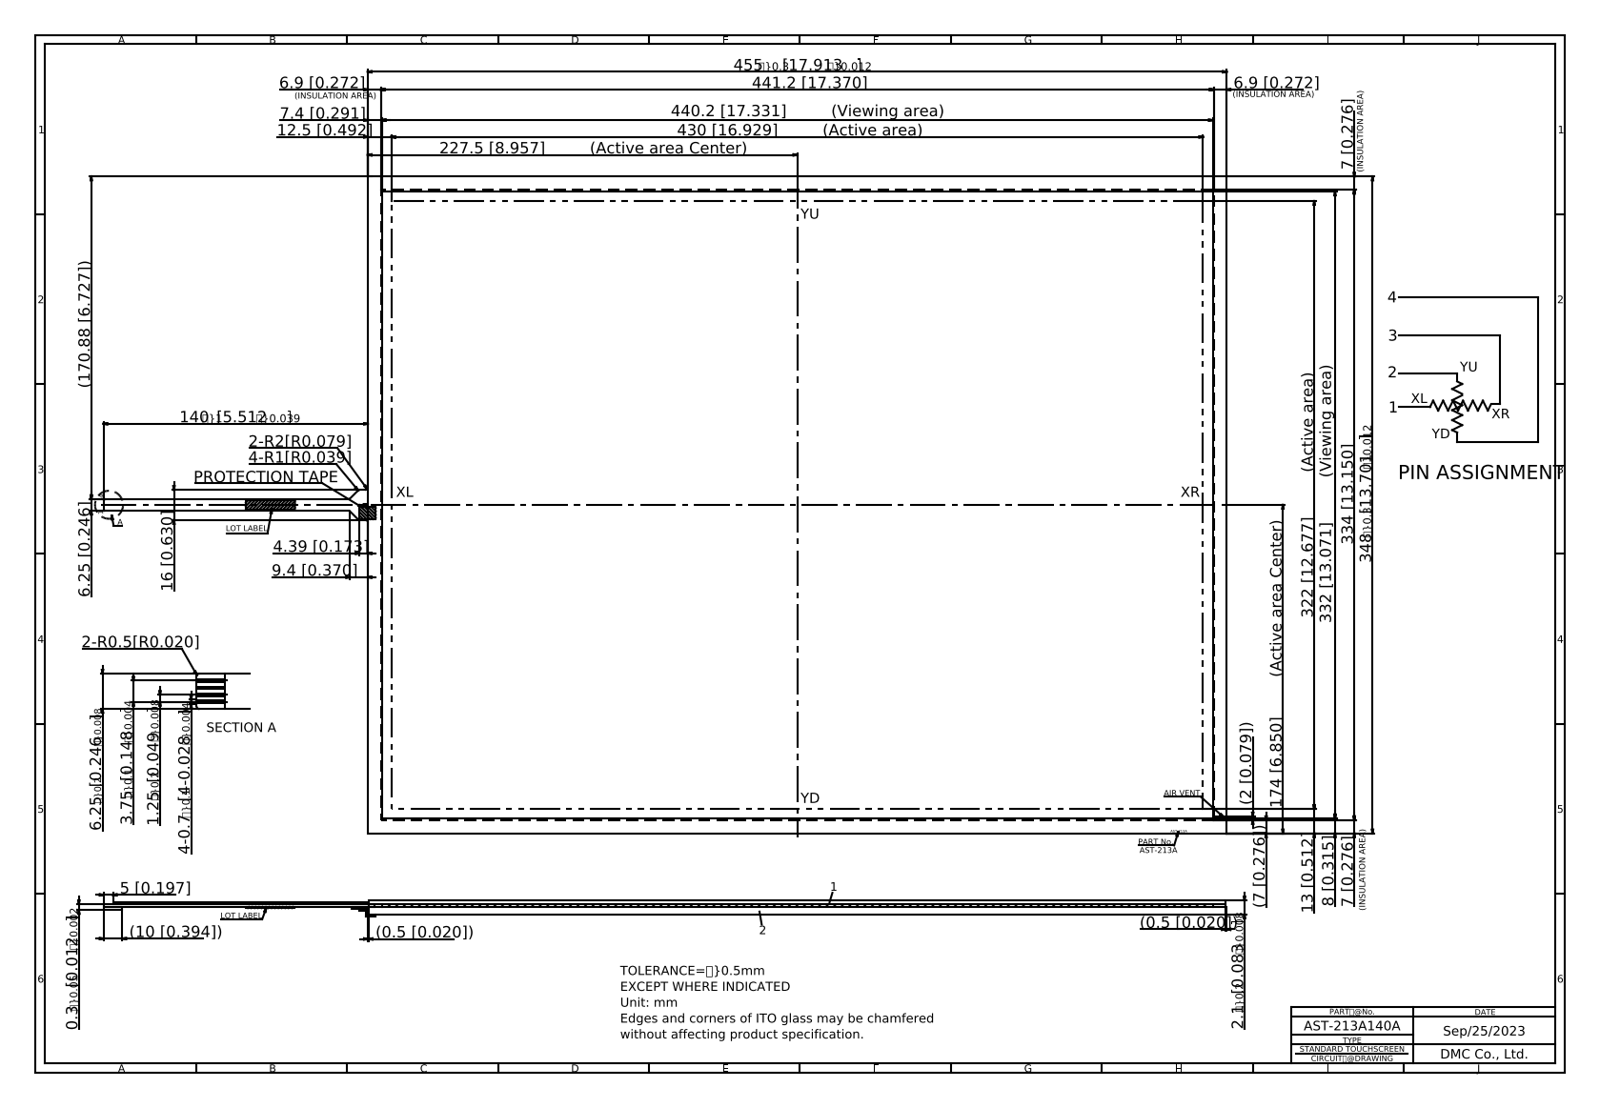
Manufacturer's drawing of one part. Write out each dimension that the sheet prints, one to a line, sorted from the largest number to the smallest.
455.00
441.2 [17.370]
440.2 [17.331] (Viewing area)
430 [16.929] (Active area)
348.00
334 [13.150]
332 [13.071] (Viewing area)
322 [12.677] (Active area)
227.5 [8.957] (Active area Center)
174 [6.850] (Active area Center)
(170.88 [6.727])
140.00
16 [0.630]
13 [0.512]
12.5 [0.492]
(10 [0.394])
9.4 [0.370]
8 [0.315]
7.4 [0.291]
7 [0.276]
7 [0.276]
(7 [0.276])
6.9 [0.272]
6.9 [0.272]
6.25{\H0.6x;?}0.2}[0.246{\H0.6x;?}0.008}]
6.25 [0.246]
5 [0.197]
4.39 [0.173]
4-0.7{\H0.66667x;?}0.1}[4-0.028{\H0.66667x;?}0.004}]
3.75{\H0.66667x;?}0.1}[0.148{\H0.66667x;?}0.004}]
2.1{\H0.6667x;?}0.2}[0.083{\H0.6667x;?}0.008}]
(2 [0.079])
1.25{\H0.66667x;?}0.2}[0.049{\H0.66667x;?}0.008}]
(0.5 [0.020])
(0.5 [0.020])
0.3{\H0.6667x;?}0.05}[0.012{\H0.6667x;?}0.002}]
